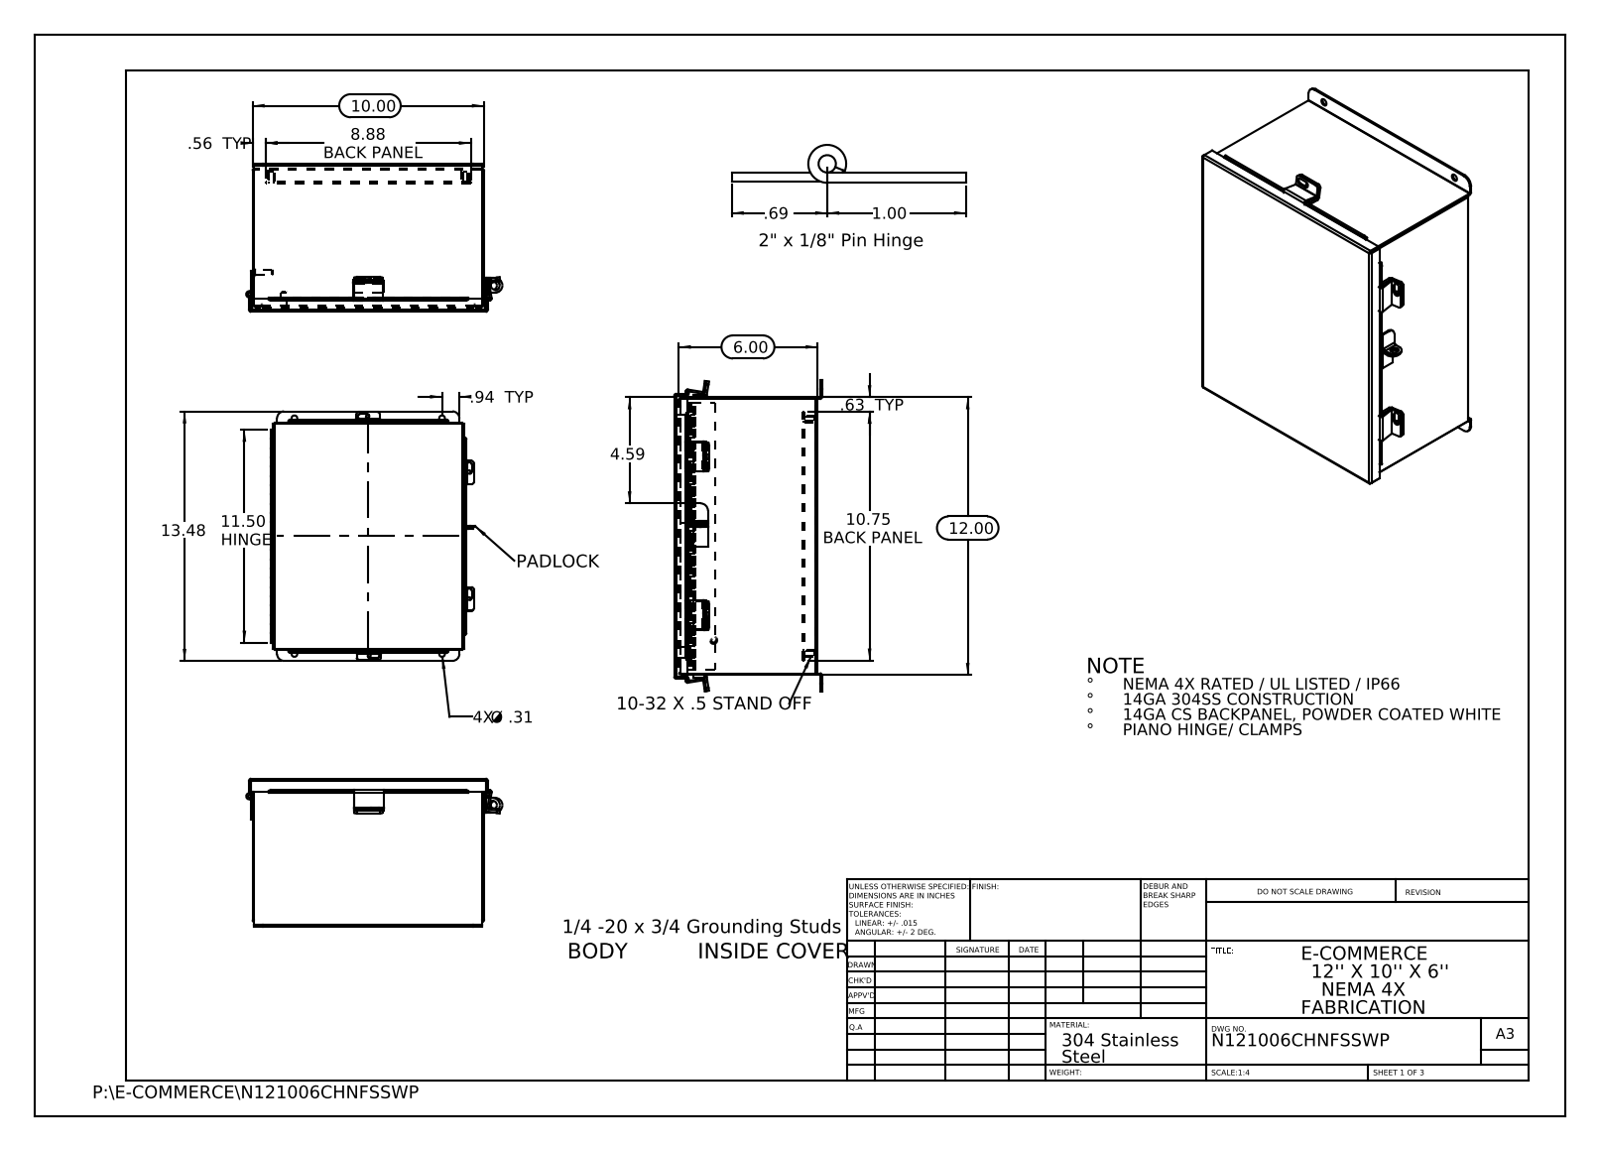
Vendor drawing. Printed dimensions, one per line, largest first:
13.48
12.00
11.50 HINGE
10.75 BACK PANEL
10.00
8.88 BACK PANEL
6.00
4.59
1.00
.94 TYP
.69
.63 TYP
.56 TYP
4X Ø .31
